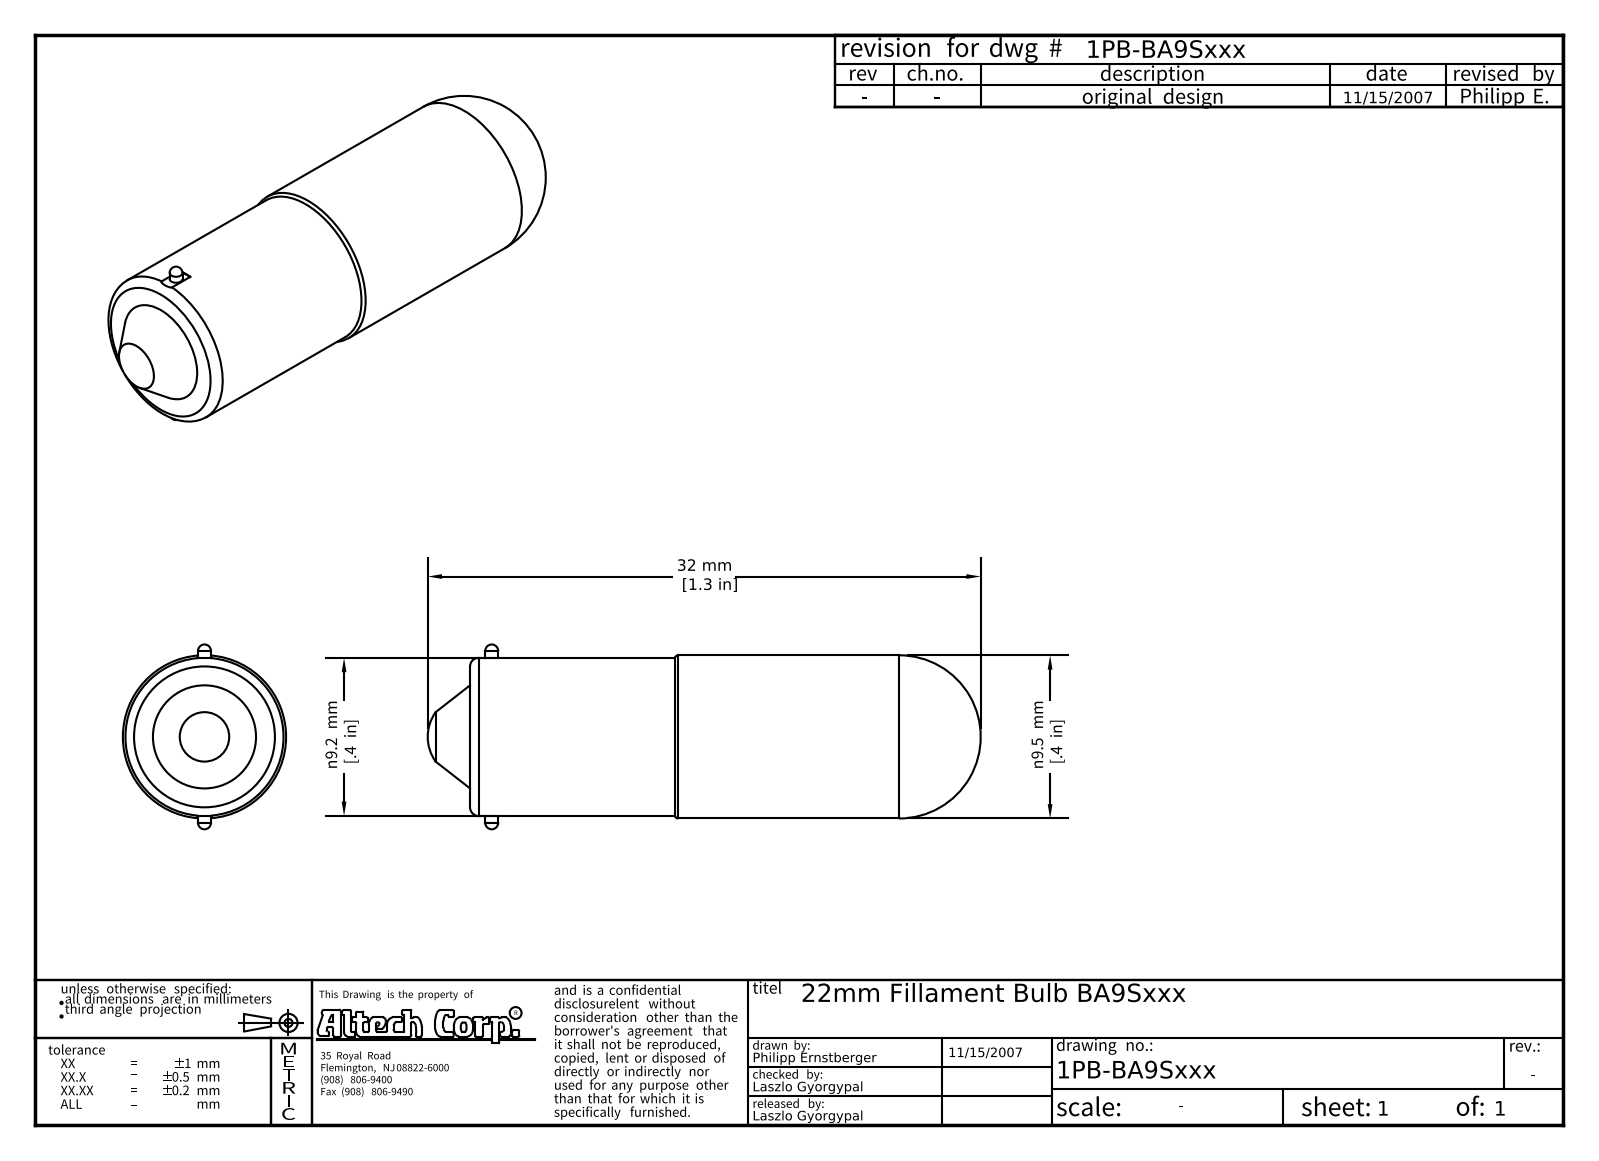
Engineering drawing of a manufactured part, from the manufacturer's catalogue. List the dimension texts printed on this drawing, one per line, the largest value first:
32 mm [1.3 in]
n9.5 mm [.4 in]
n9.2 mm [.4 in]
